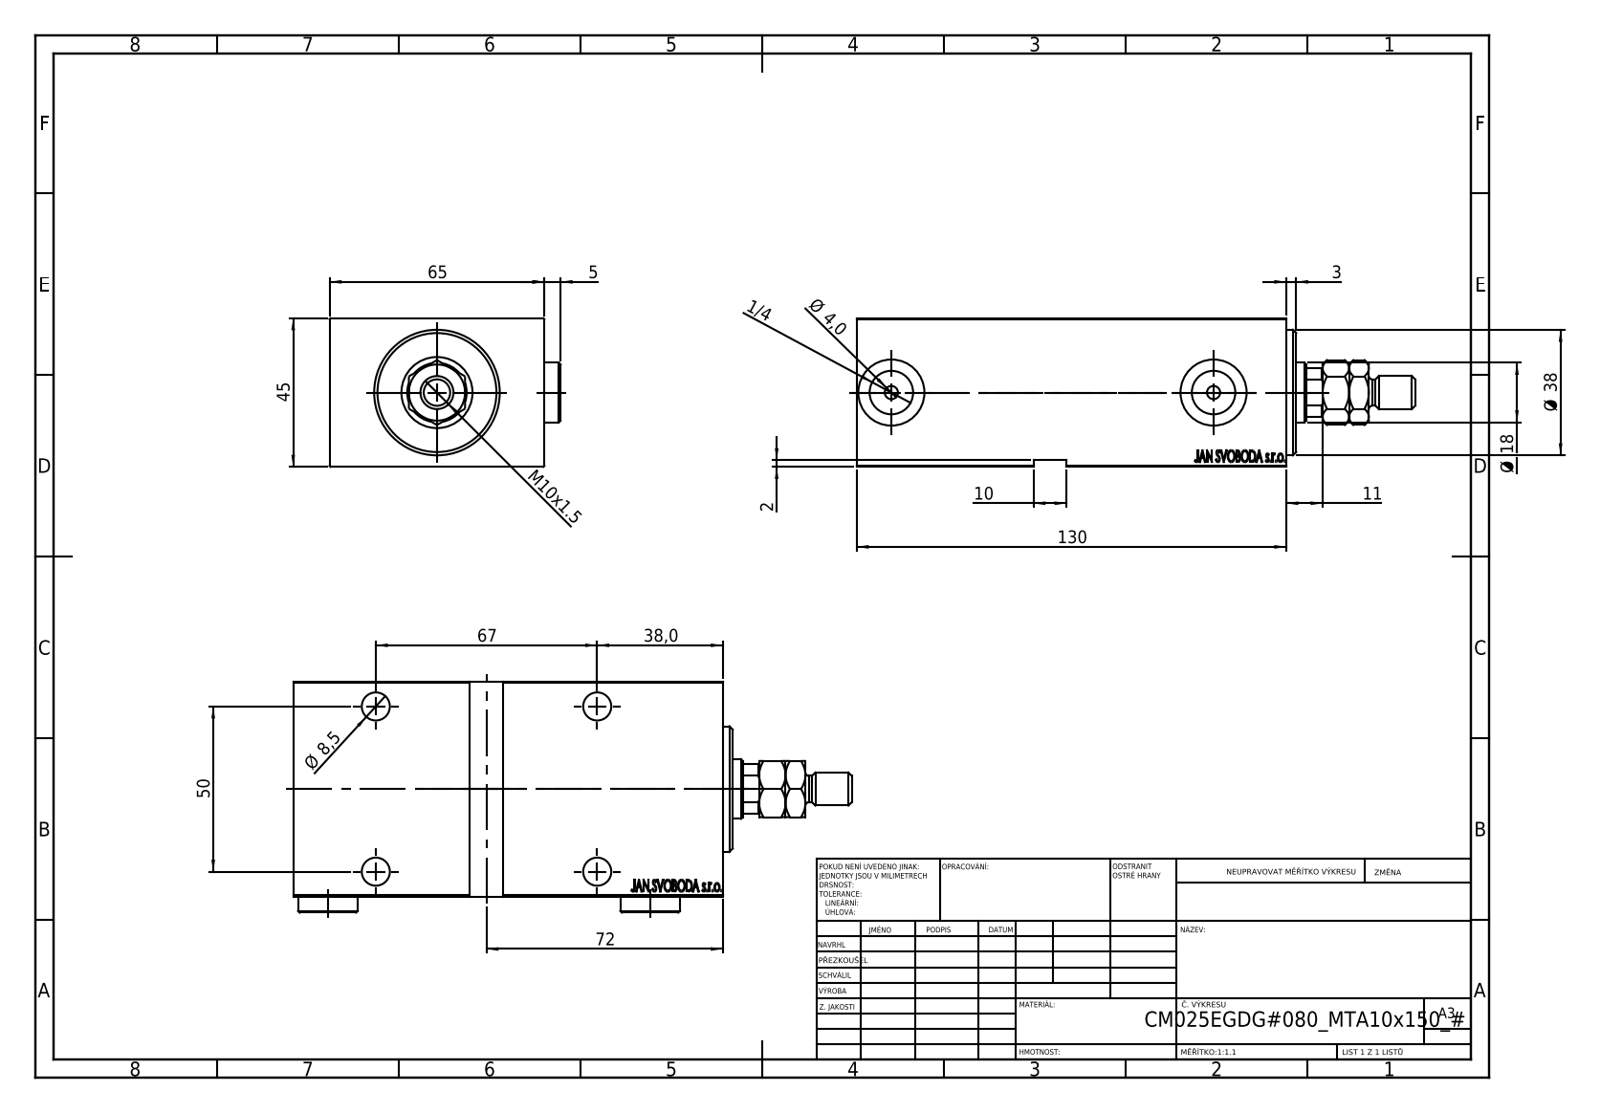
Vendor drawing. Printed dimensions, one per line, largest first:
130
72
67
65
50
45
Ø 38
38,0
Ø 18
11
M10x1.5
10
Ø 8,5
5
Ø 4,0
3
2
1/4
